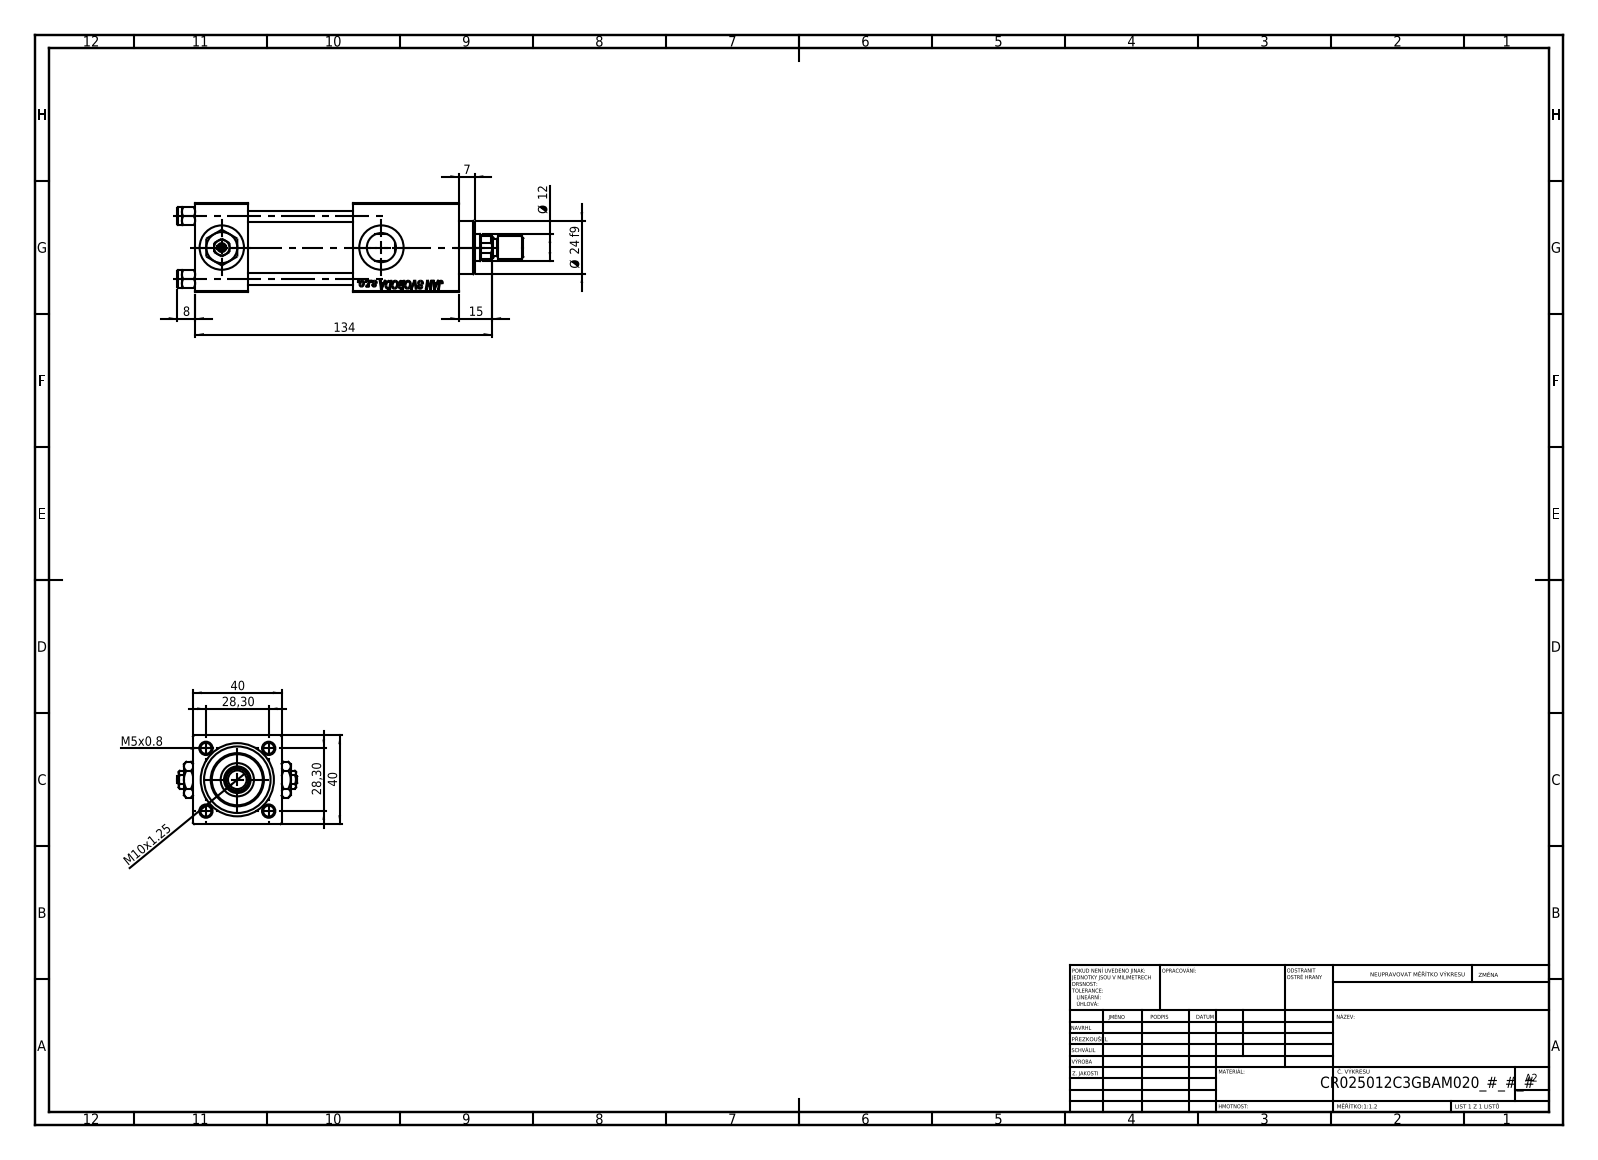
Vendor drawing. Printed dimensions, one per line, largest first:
134
40
40
28,30
28,30
Ø 24 f9
15
Ø 12
M10x1.25
8
7
M5x0.8
